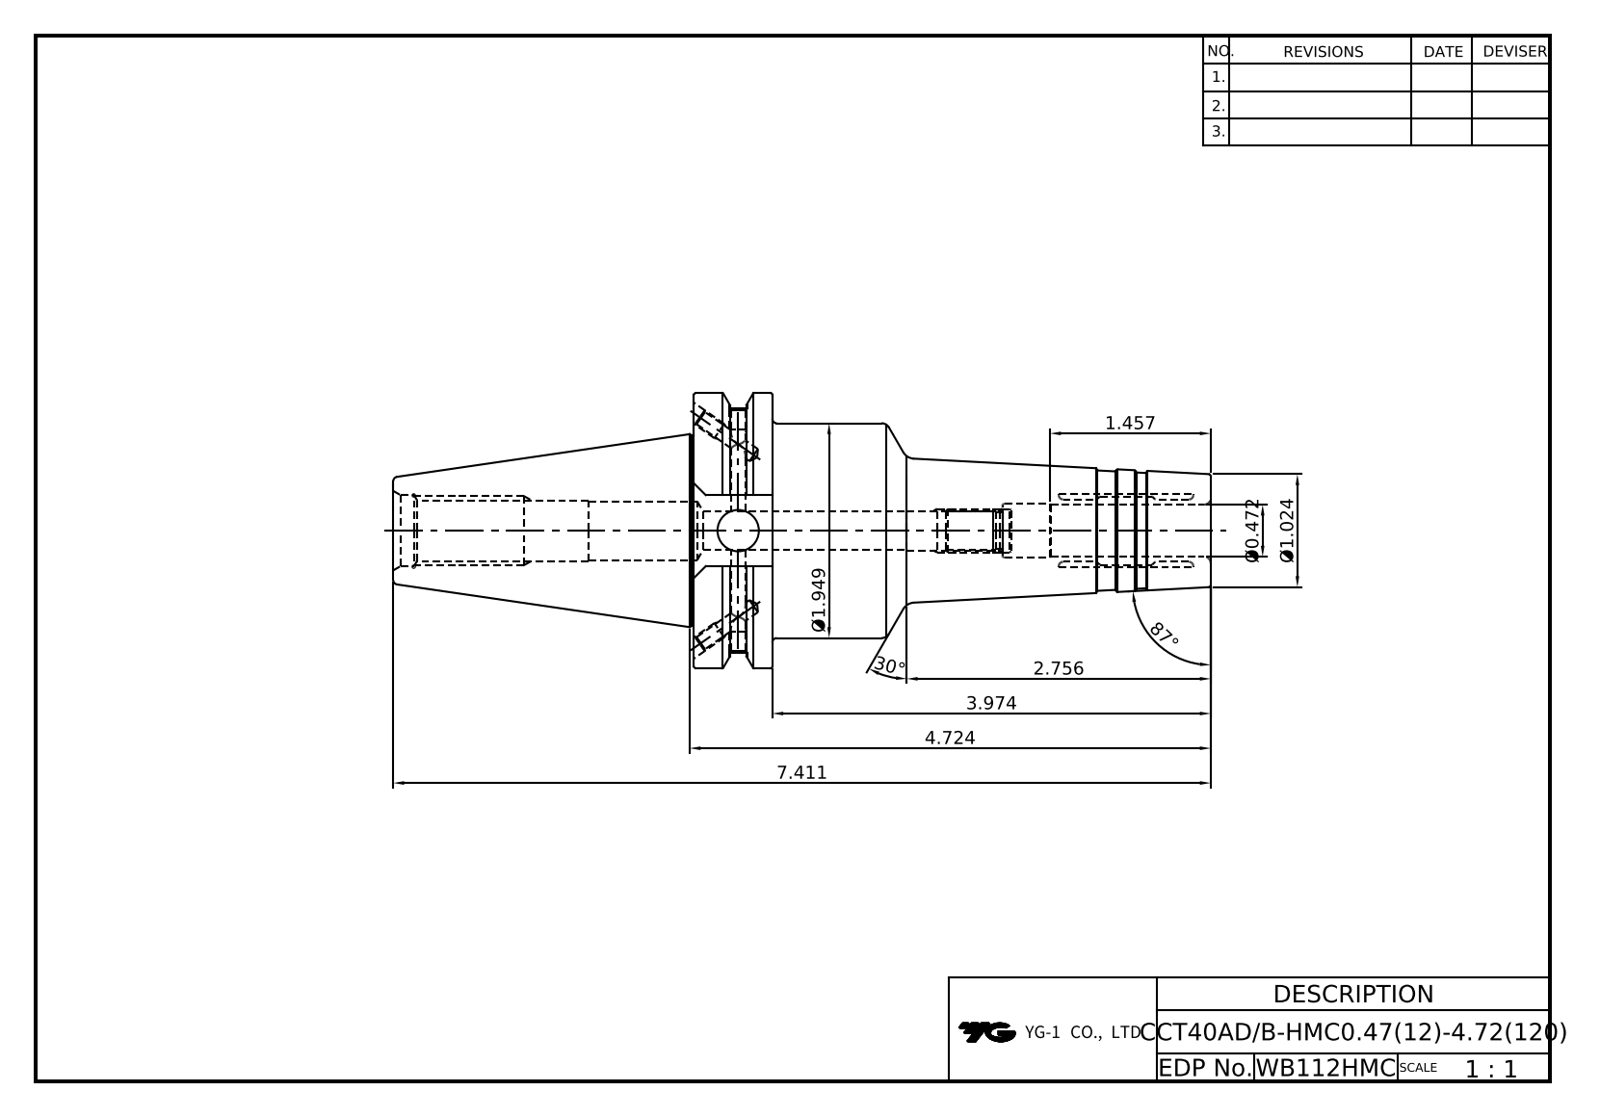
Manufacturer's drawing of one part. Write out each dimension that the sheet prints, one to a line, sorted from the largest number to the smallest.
87°
30°
7.411
4.724
3.974
2.756
Ø1.949
1.457
Ø1.024
Ø0.472
